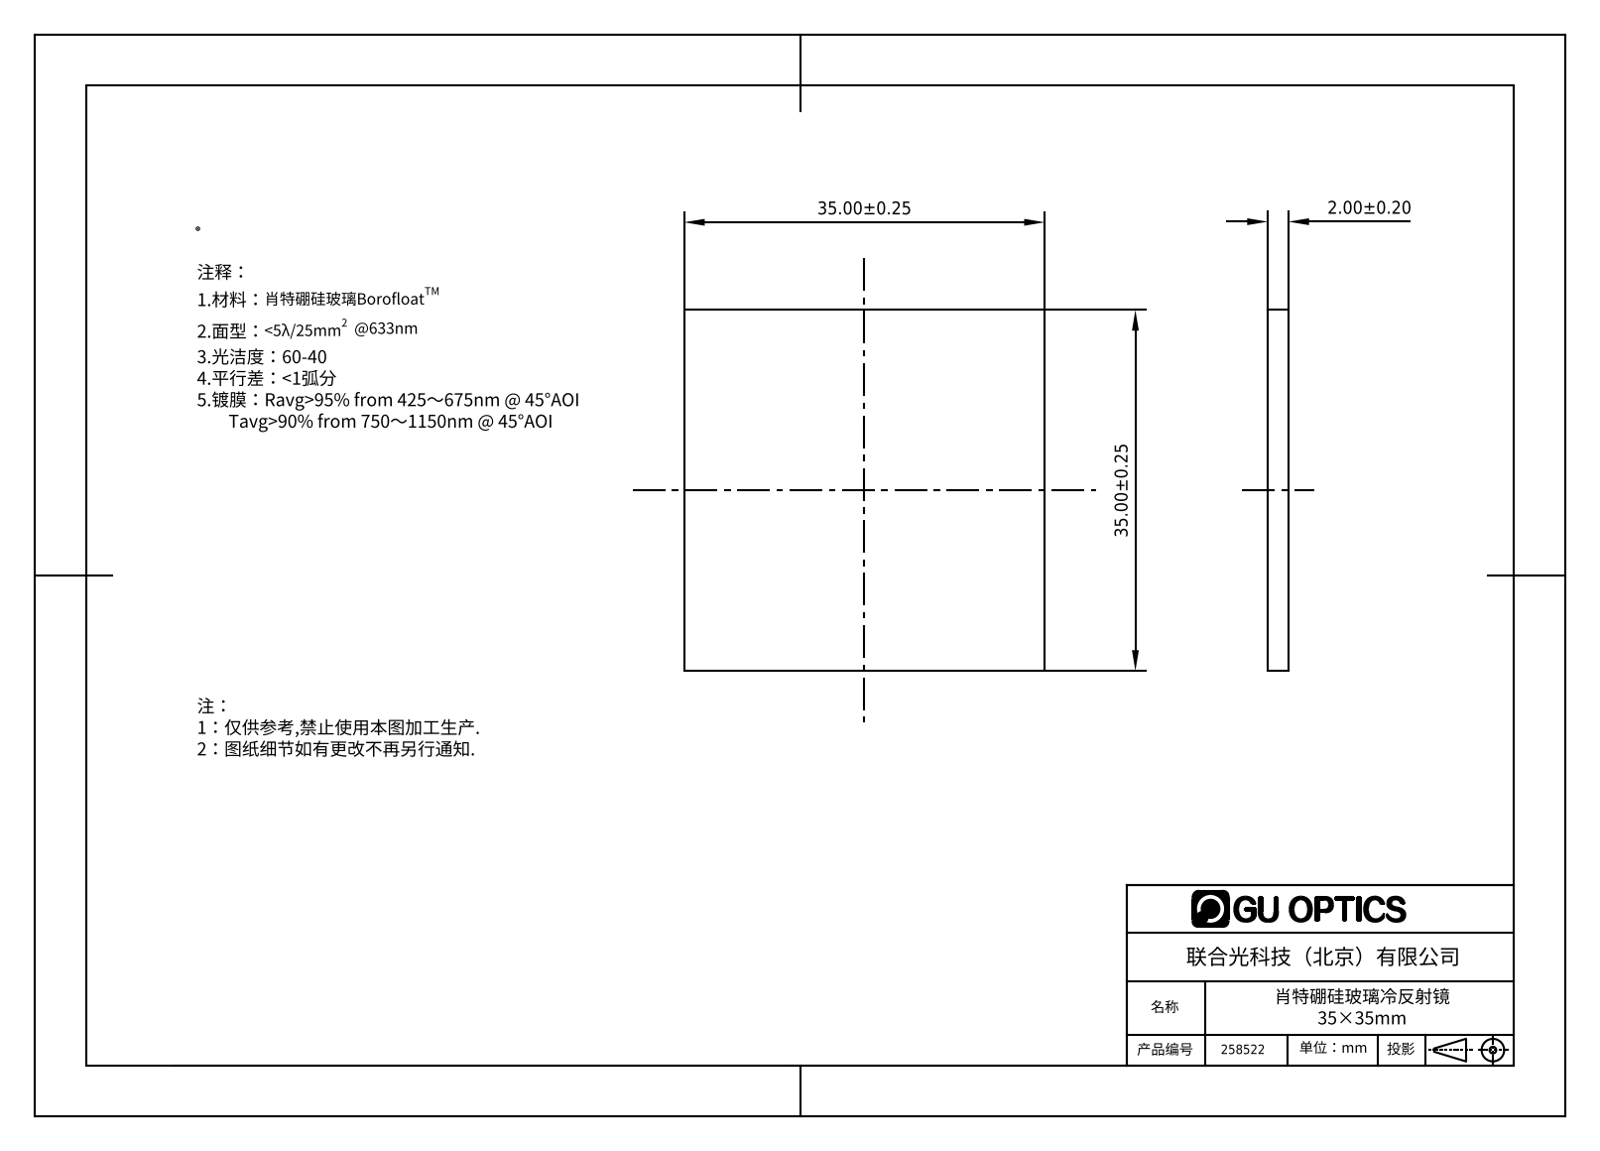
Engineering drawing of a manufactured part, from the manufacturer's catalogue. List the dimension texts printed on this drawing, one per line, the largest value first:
35.00±0.25
35.00±0.25
2.00±0.20
